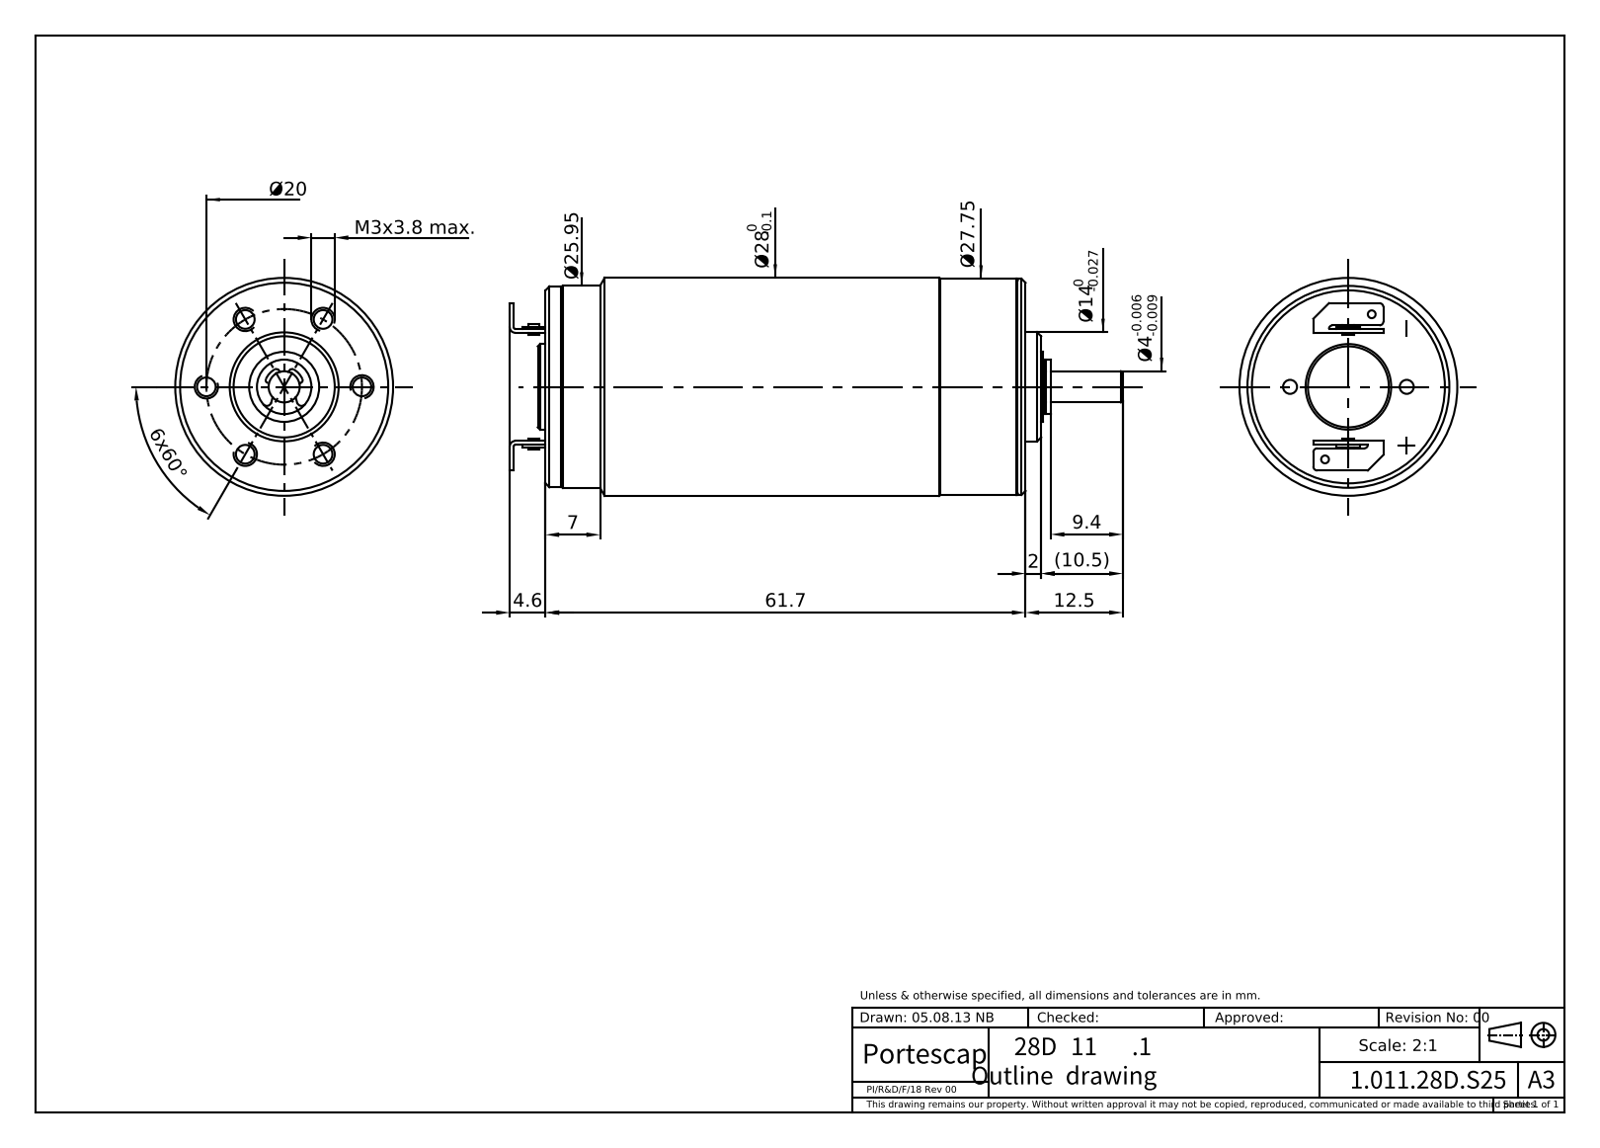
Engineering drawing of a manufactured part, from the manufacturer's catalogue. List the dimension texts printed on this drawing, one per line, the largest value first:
61.7
6x60°
12.5
(10.5)
9.4
7
4.6
M3x3.8 max.
2
